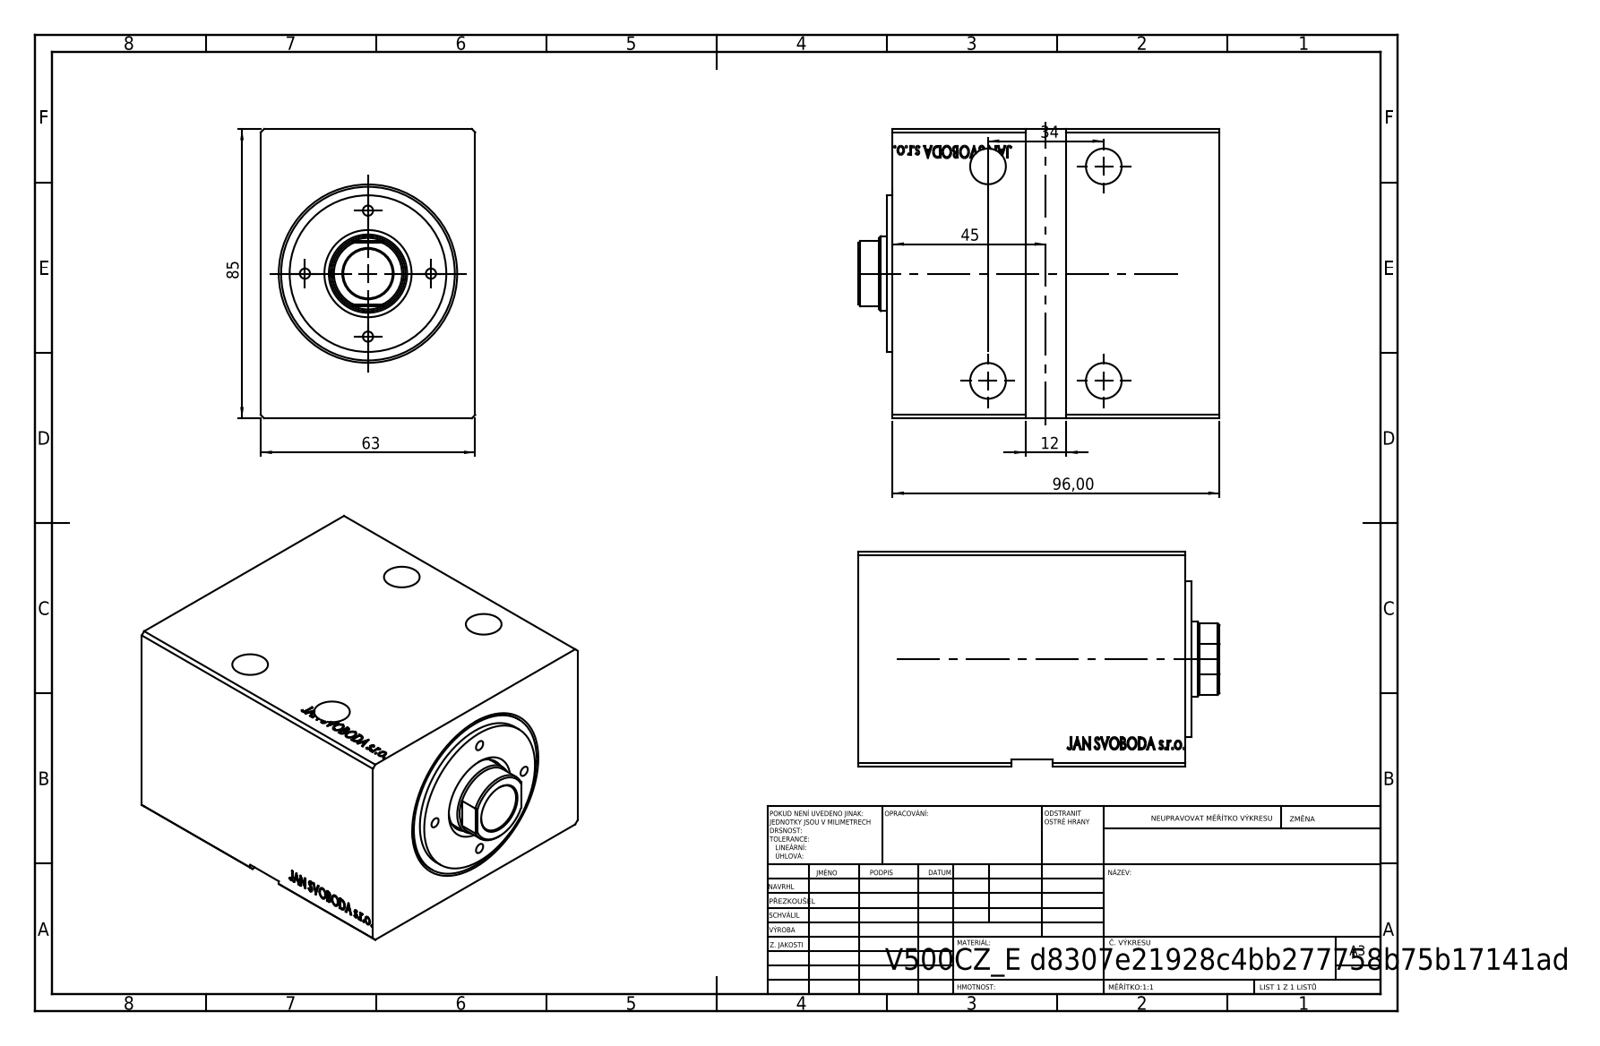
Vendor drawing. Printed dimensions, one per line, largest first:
96,00
85
63
45
34
12
